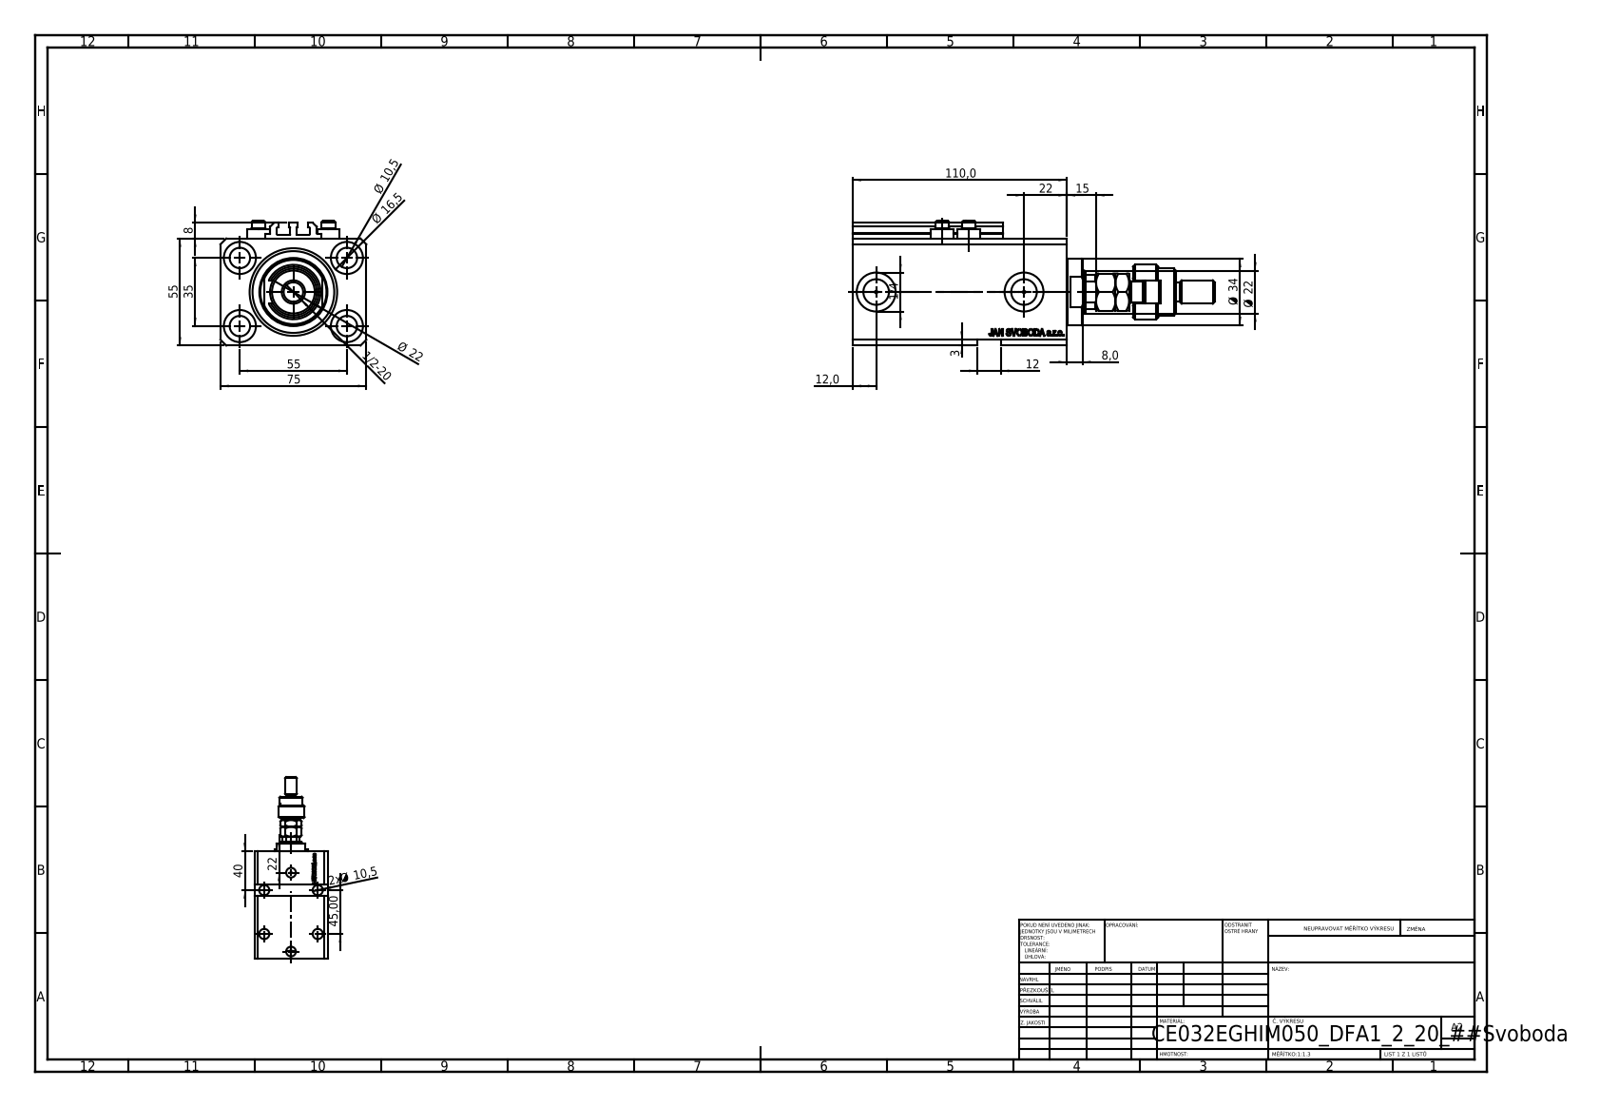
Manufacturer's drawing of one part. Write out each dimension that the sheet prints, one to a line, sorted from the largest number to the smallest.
110,0
75
55
55
45,00
40
35
Ø 34
Ø 22
22
Ø 22
22
Ø 16,5
15
12,0
12
Ø 10,5
2x Ø 10,5
8
8,0
3
1/2-20
1/4
